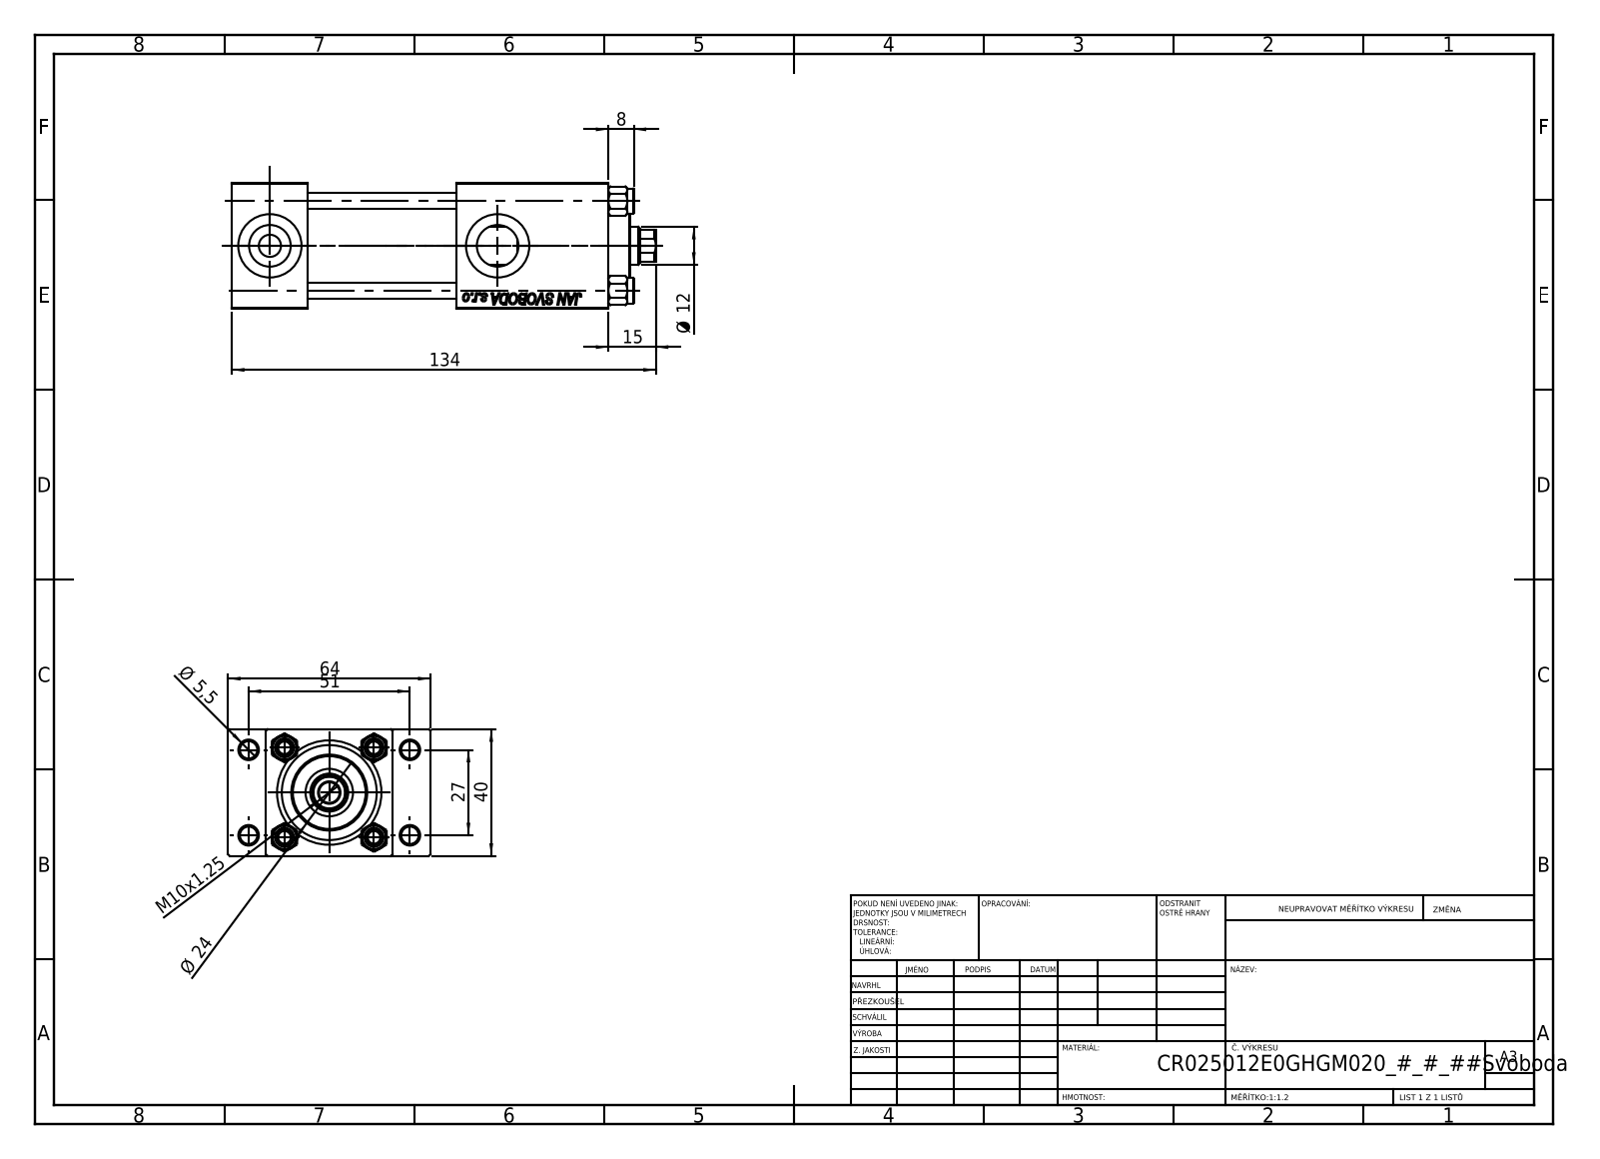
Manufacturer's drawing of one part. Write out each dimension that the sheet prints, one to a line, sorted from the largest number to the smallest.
134
64
51
40
27
Ø 24
15
Ø 12
M10x1.25
8
Ø 5,5
